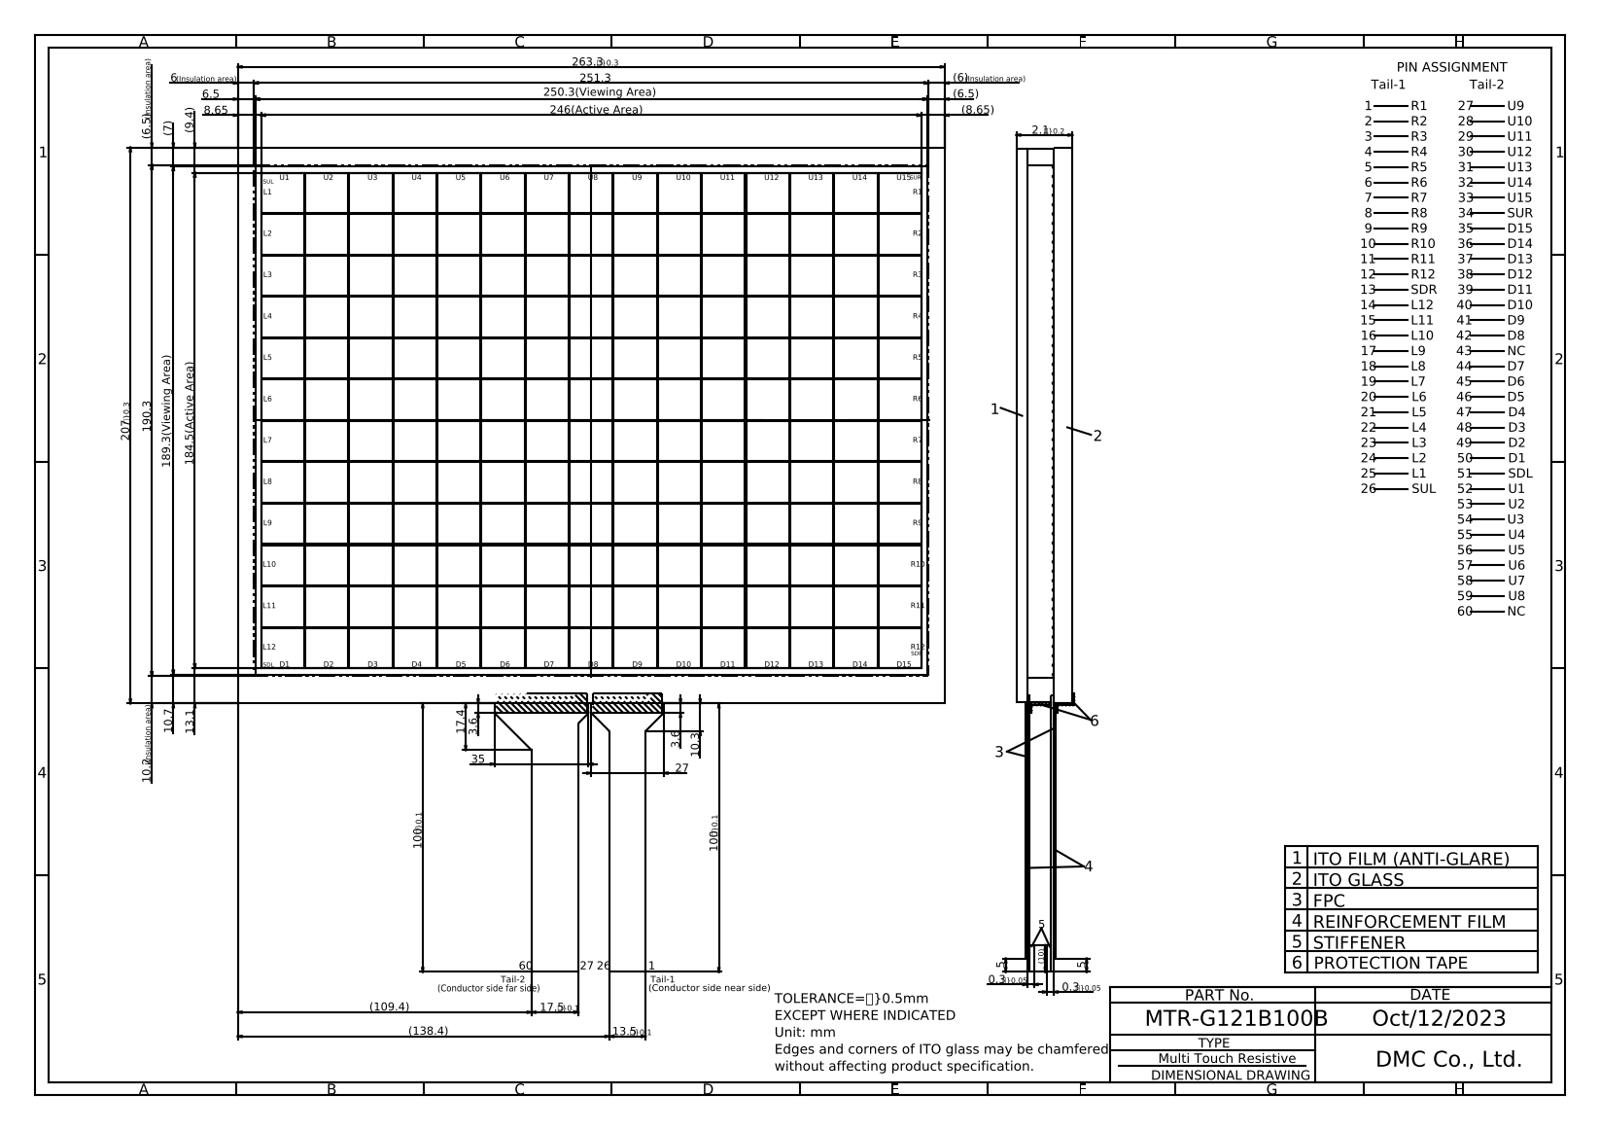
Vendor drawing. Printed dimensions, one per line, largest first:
263.30
251.3
250.3(Viewing Area)
246(Active Area)
207.00
190.3
189.3(Viewing Area)
184.5(Active Area)
(138.4)
(109.4)
100.00
100.00
35
27
17.50
17.4
13.50
13.1
10.7
10.3
10.20{\H0.6667x;(Insulation area)}
(10)
(9.4)
(8.65)
8.65
(7)
(6.5)
(6.500){\H0.66667x;(Insulation area)}
6.5
(6.000){\H0.6667x;(Insulation area)}
6.00{\H0.6667x;(Insulation area)}
5
5
3.6
3.6
2.1{\H0.6667x;?}0.2}
0.3{\H0.6667x;?}0.05}
0.3{\H0.6667x;?}0.05}
